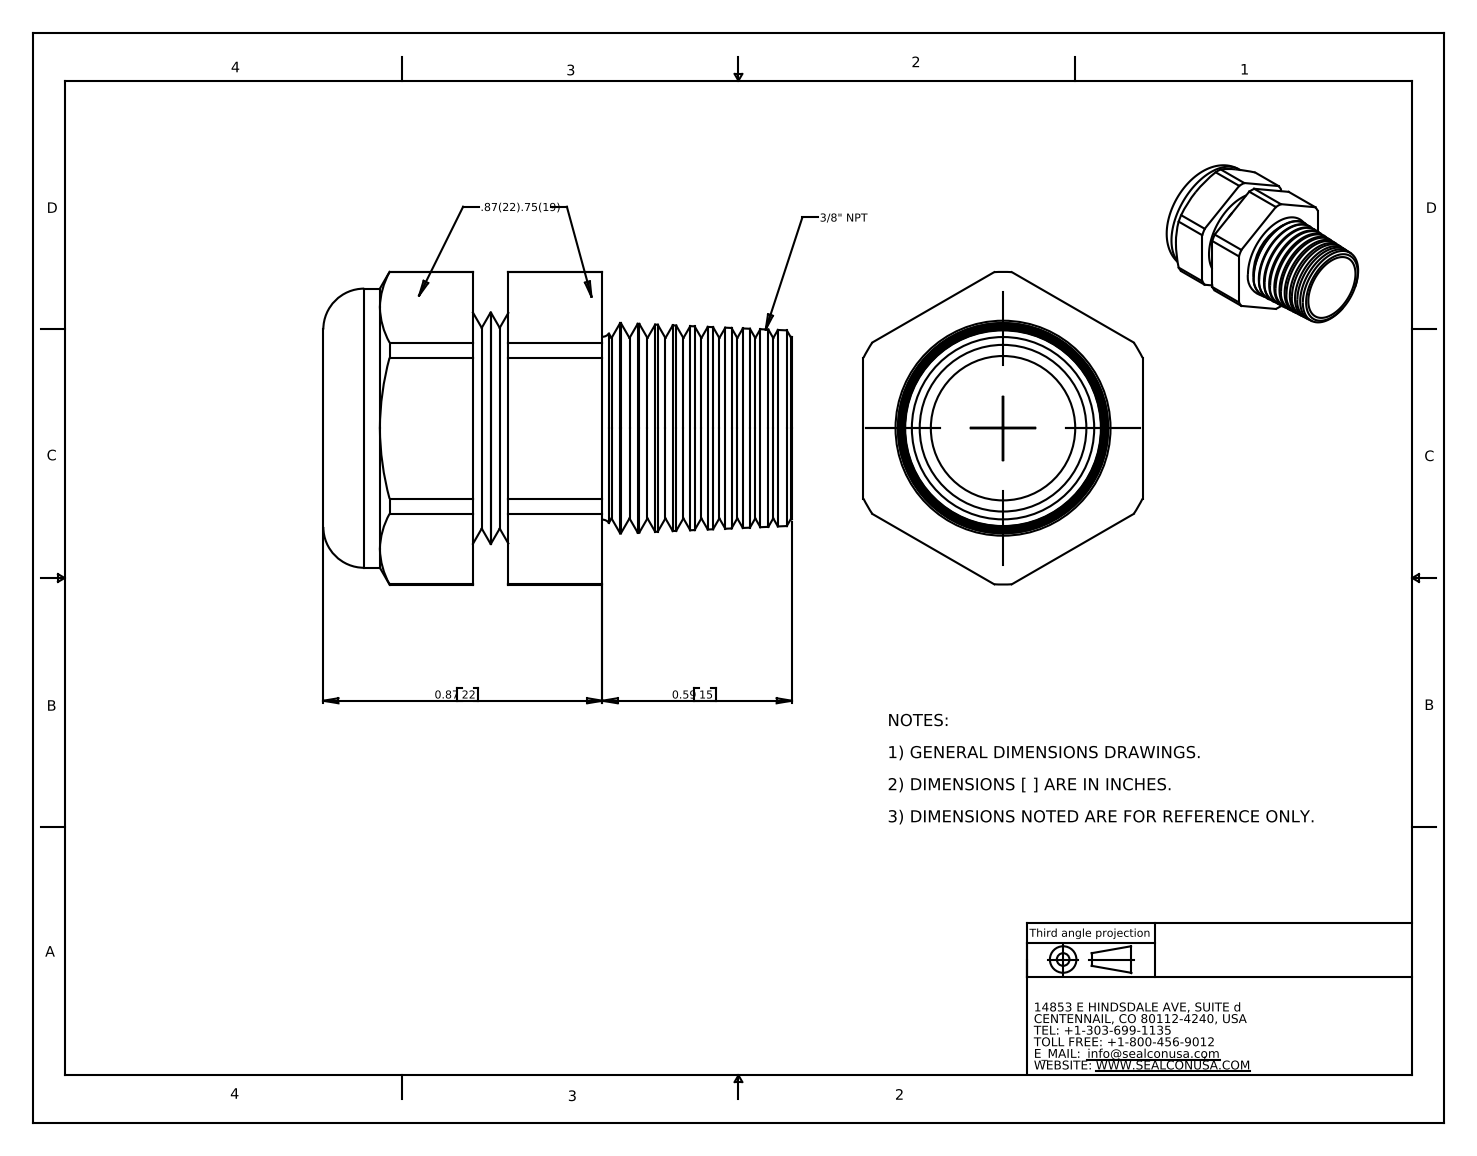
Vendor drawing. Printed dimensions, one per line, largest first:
0.87 22
0.59 15
